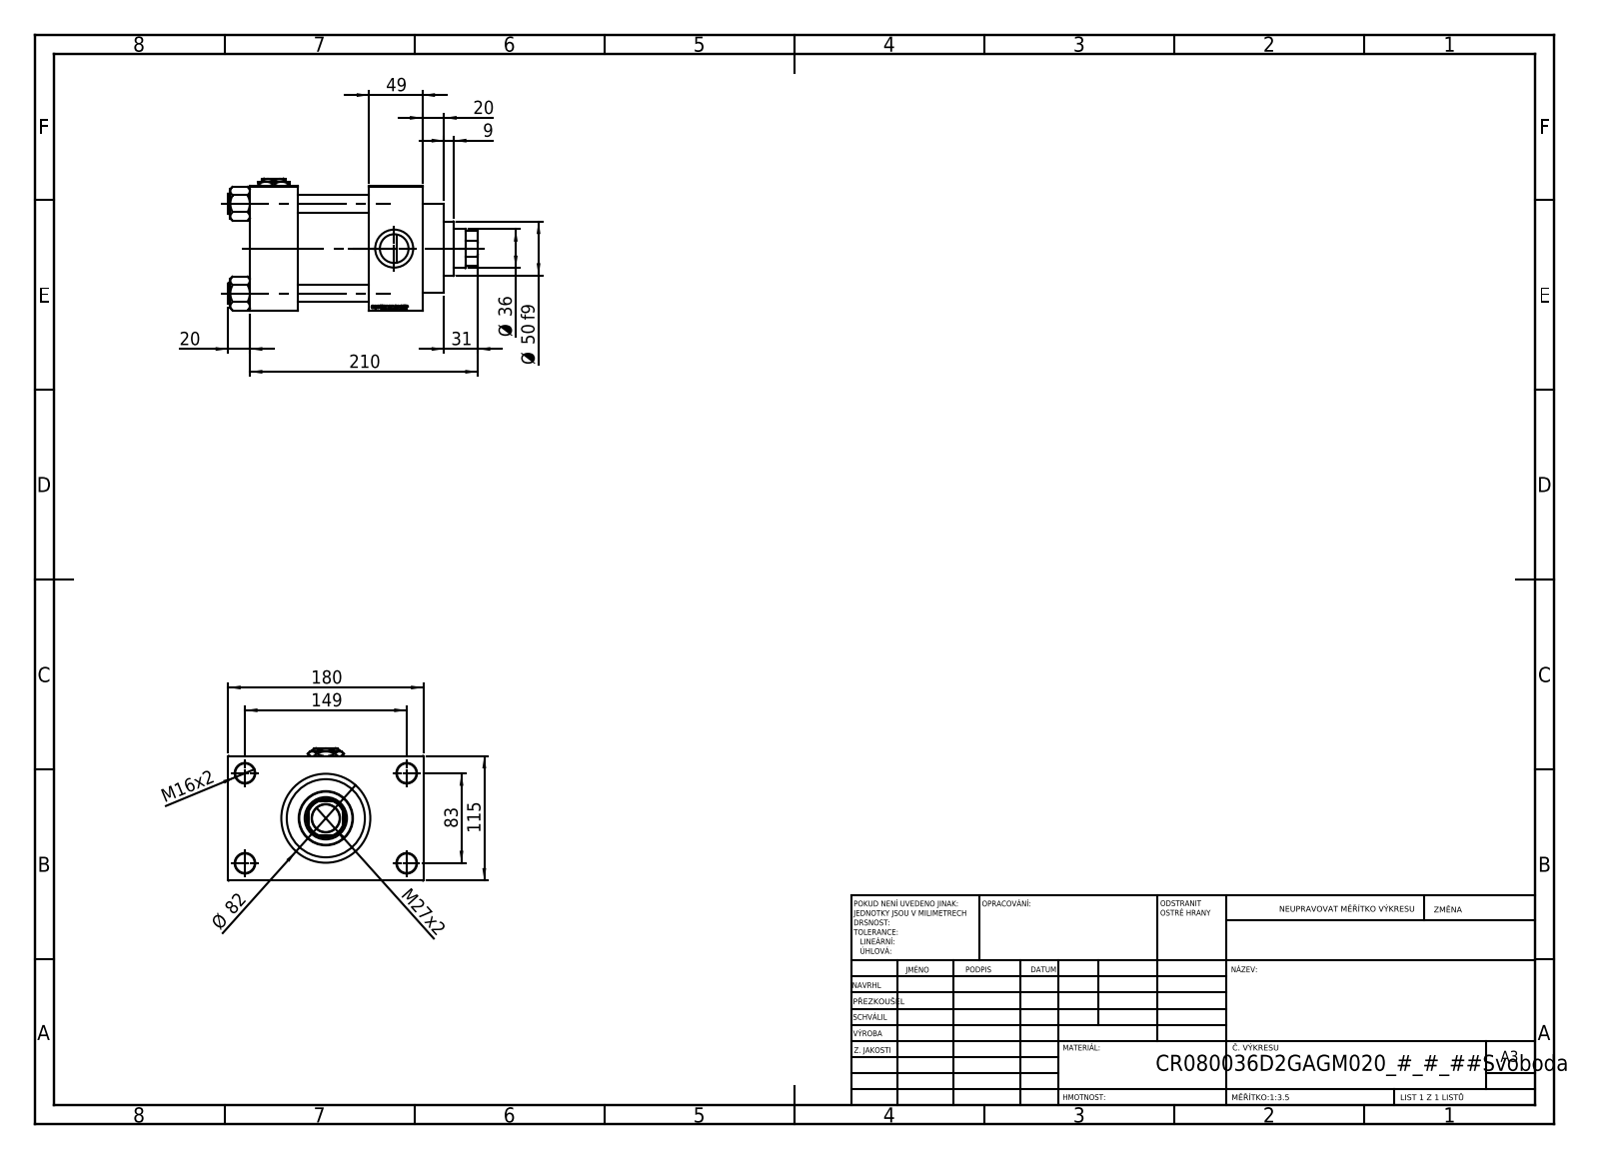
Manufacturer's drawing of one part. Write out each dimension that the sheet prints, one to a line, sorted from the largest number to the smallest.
210
180
149
115
83
Ø 82
Ø 50 f9
49
Ø 36
31
M27x2
20
20
M16x2
9
